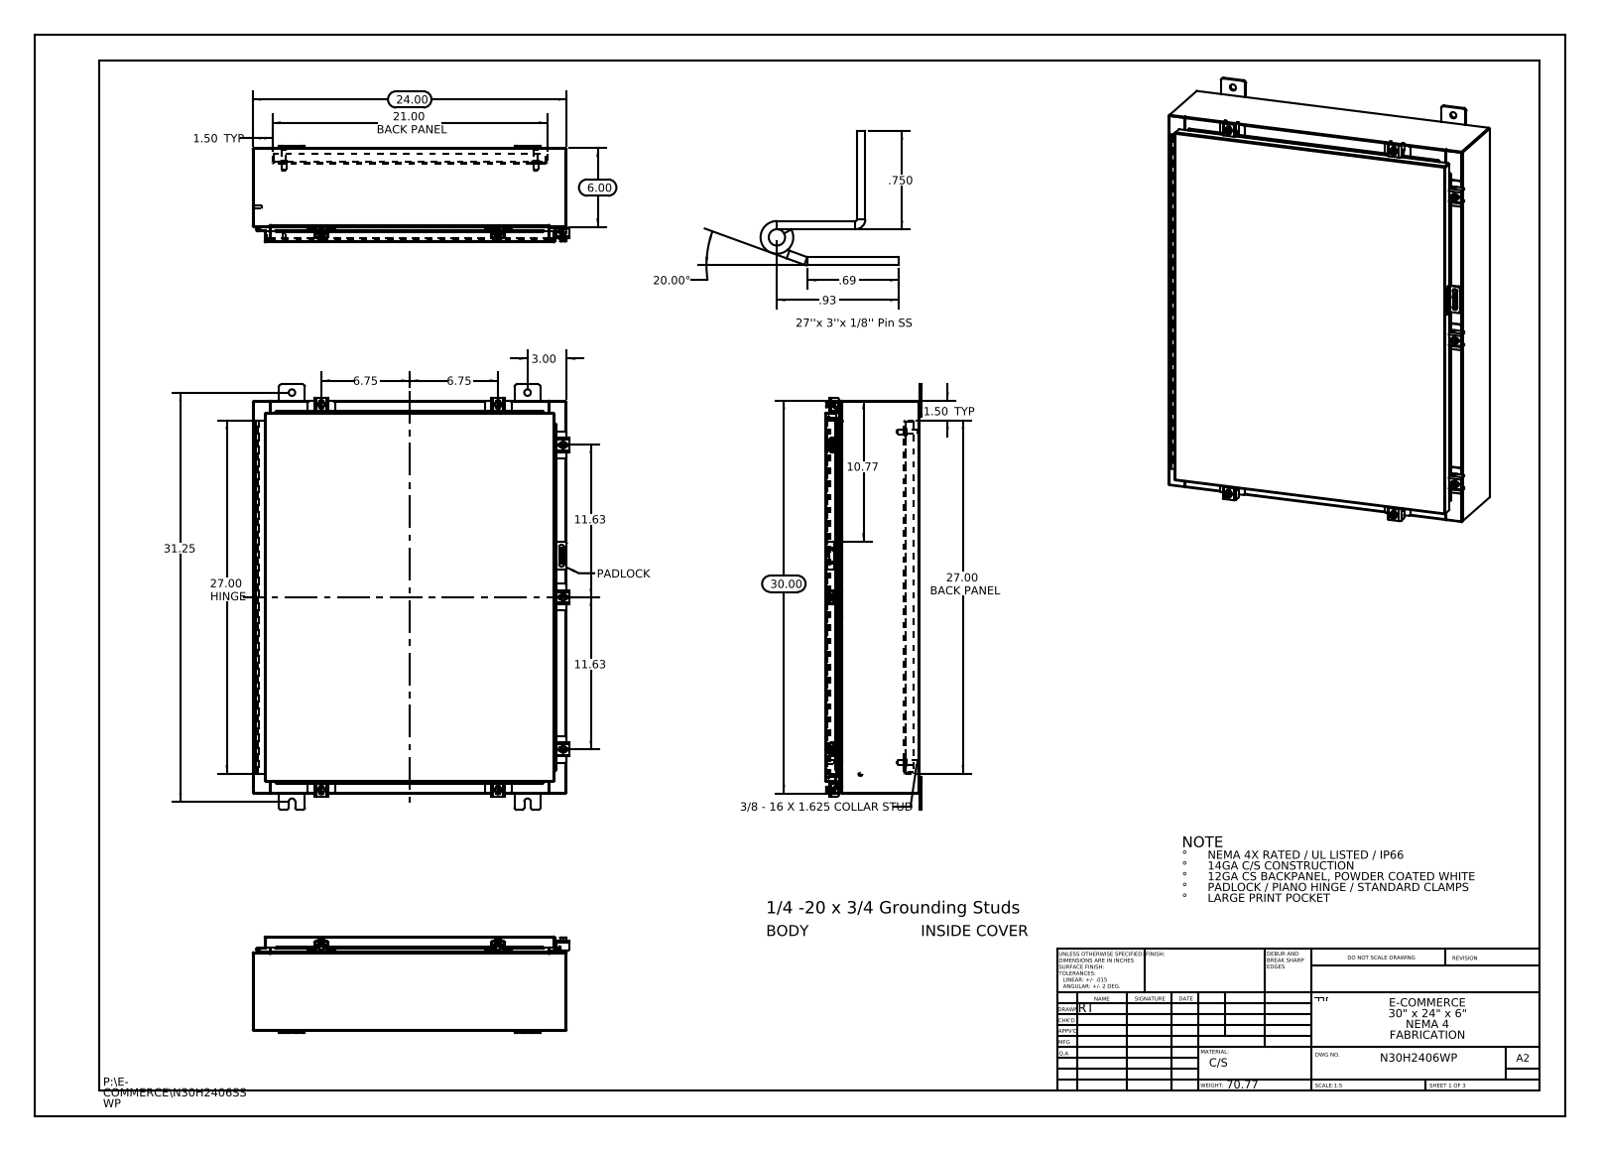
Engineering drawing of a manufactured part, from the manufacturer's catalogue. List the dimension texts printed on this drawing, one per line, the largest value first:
31.25
30.00
27.00 HINGE
27.00 BACK PANEL
24.00
21.00 BACK PANEL
20.00°
11.63
11.63
10.77
6.75
6.75
6.00
3.00
1.50 TYP
1.50 TYP
.93
.750
.69
